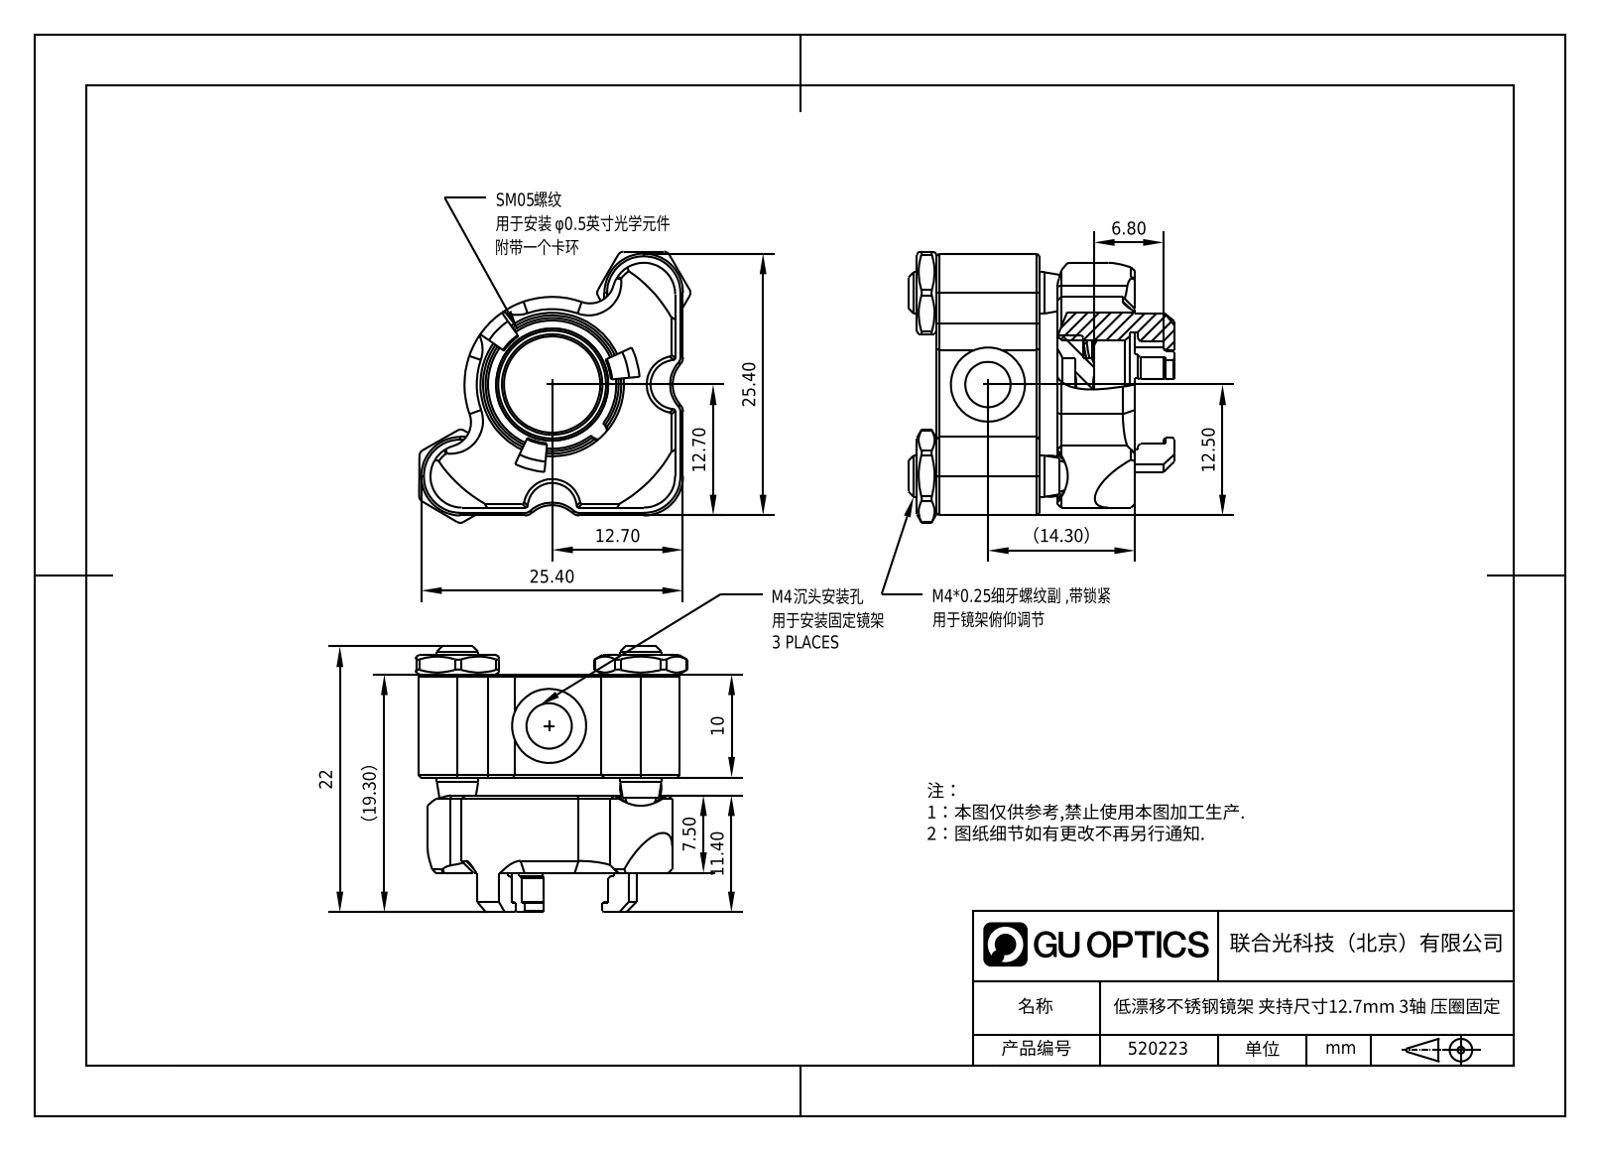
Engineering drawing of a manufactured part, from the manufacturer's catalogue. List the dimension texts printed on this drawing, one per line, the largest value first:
25.40
25.40
22
（19.30）
（14.30）
12.70
12.70
12.50
11.40
10
7.50
6.80
